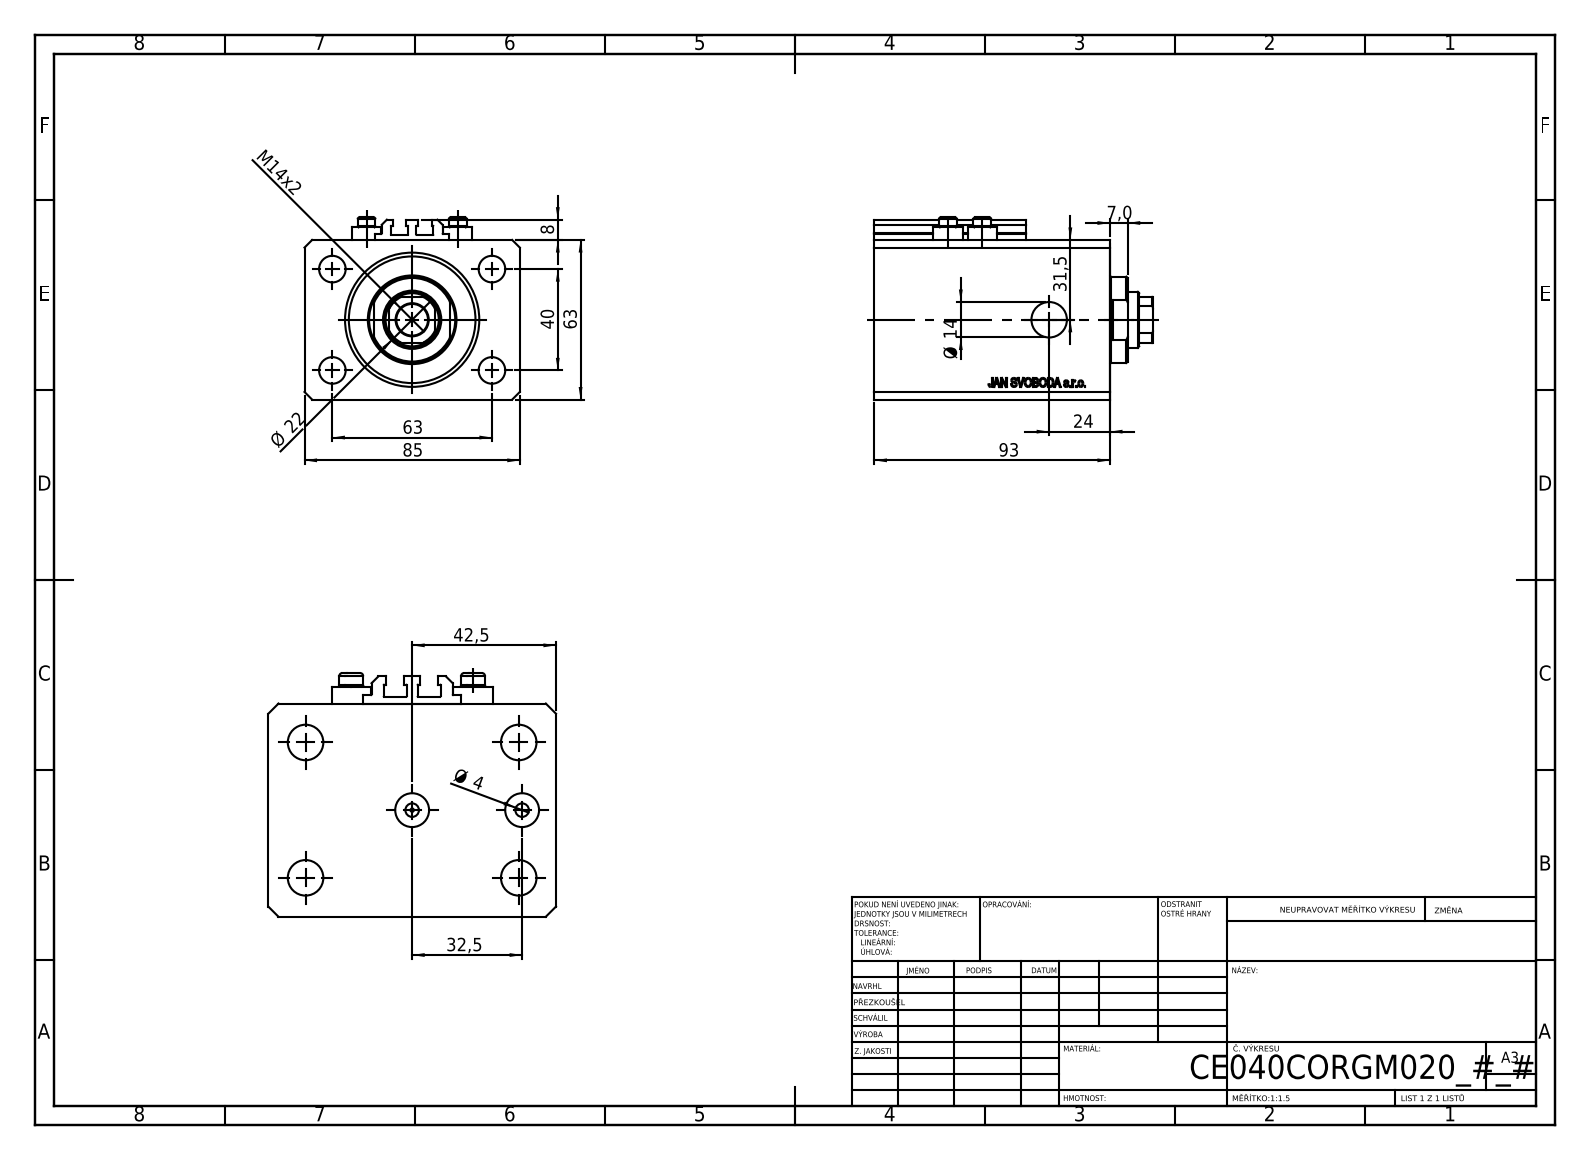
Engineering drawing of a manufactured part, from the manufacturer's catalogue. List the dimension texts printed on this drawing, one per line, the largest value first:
93
85
63
63
42,5
40
32,5
31,5
24
Ø 22
M14x2
Ø 14
8
7,0
Ø 4
